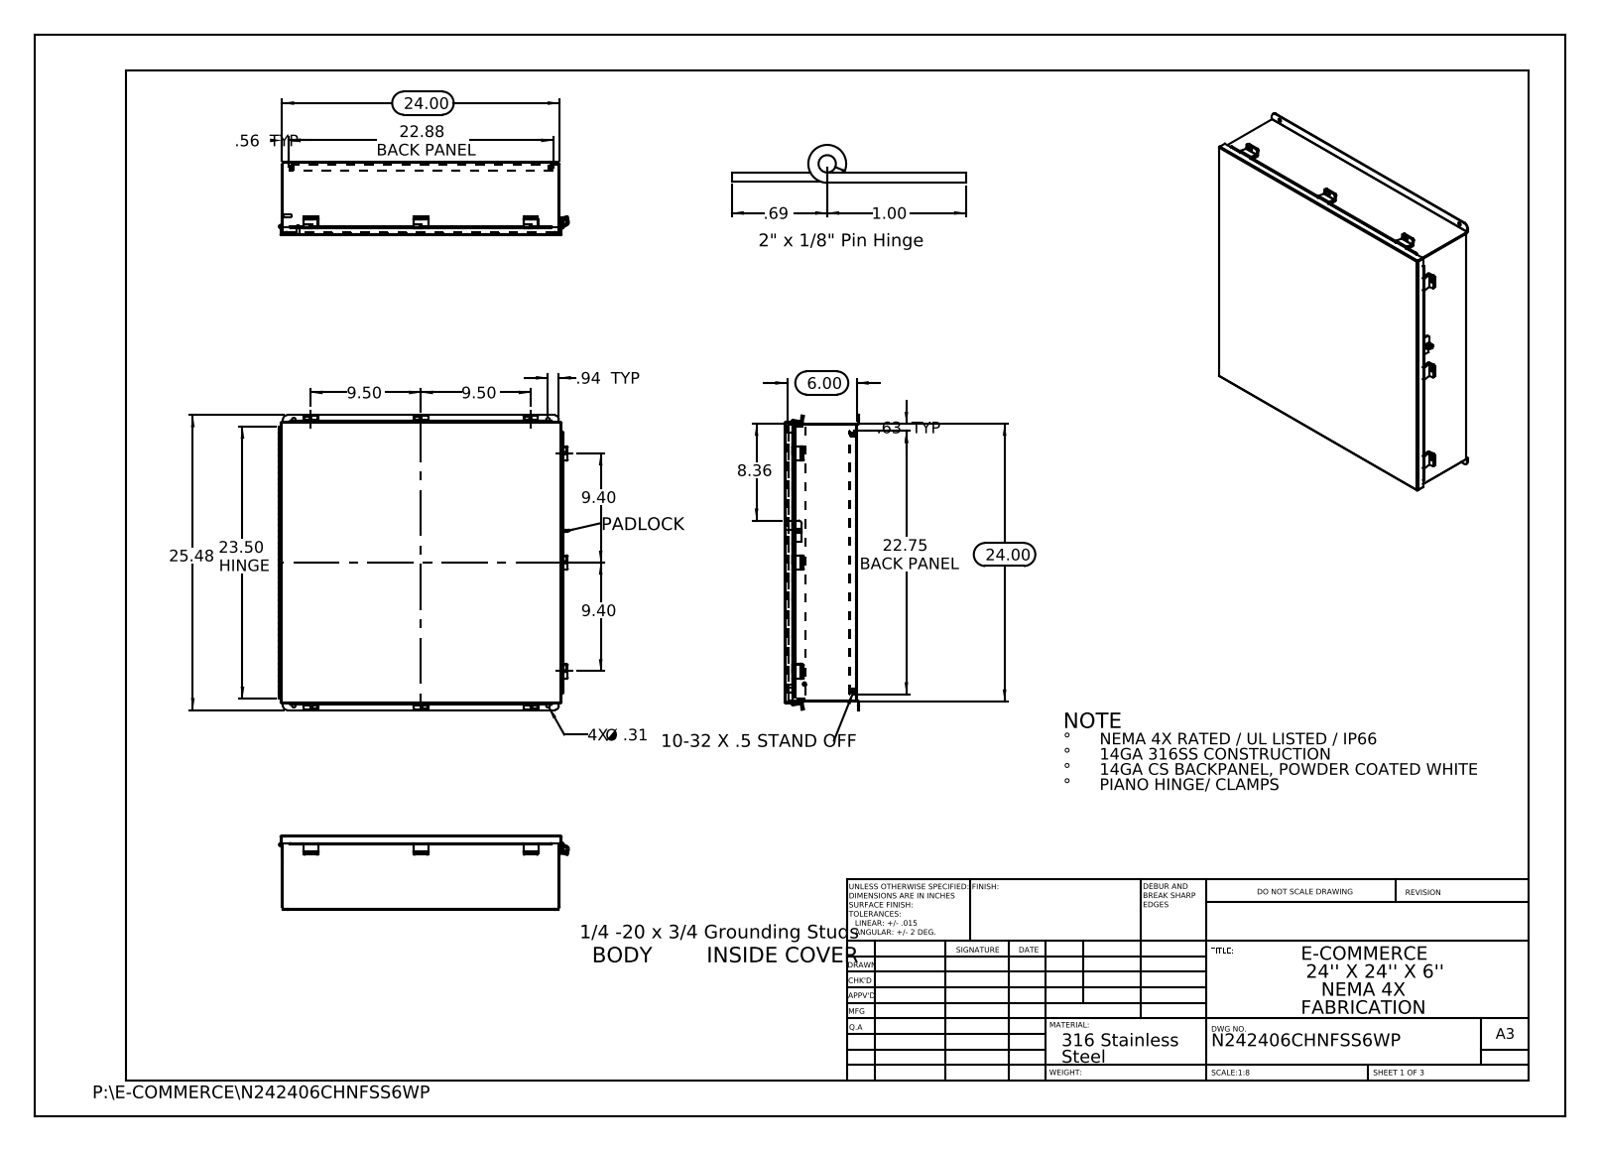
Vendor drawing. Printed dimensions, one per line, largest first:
25.48
24.00
24.00
23.50 HINGE
22.88 BACK PANEL
22.75 BACK PANEL
9.50
9.50
9.40
9.40
8.36
6.00
1.00
.94 TYP
.69
.63 TYP
.56 TYP
4X Ø .31
